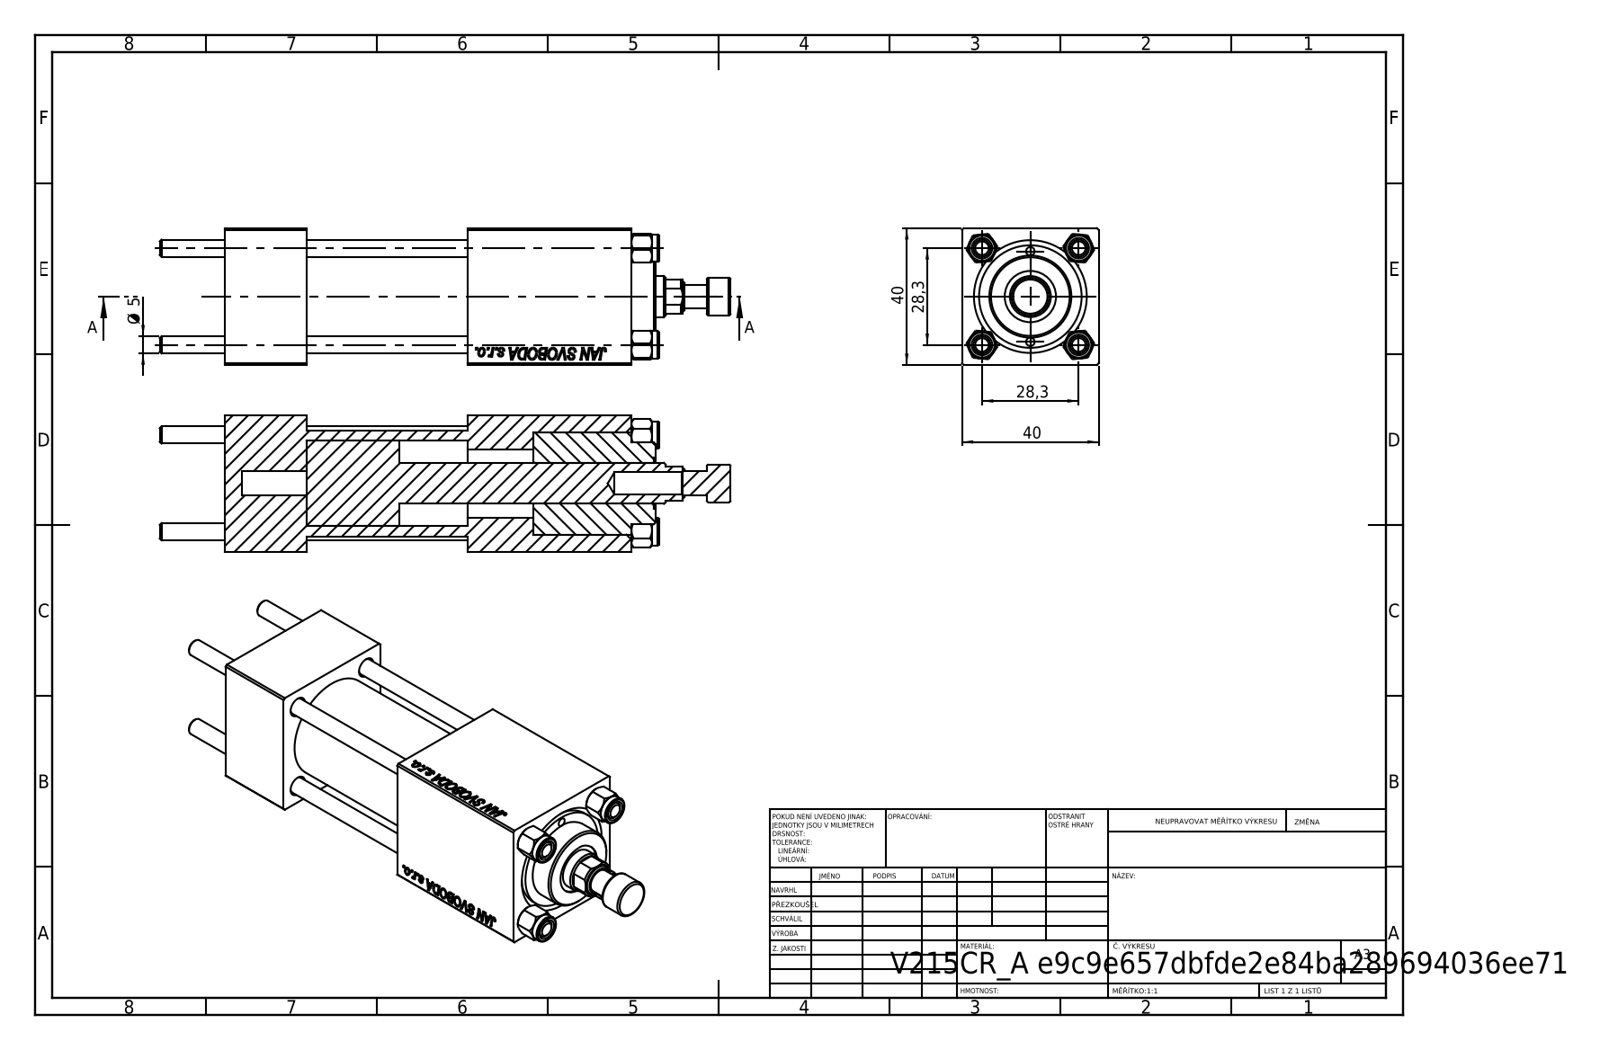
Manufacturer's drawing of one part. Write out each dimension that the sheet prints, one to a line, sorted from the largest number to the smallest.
40
40
28,3
28,3
Ø 5
